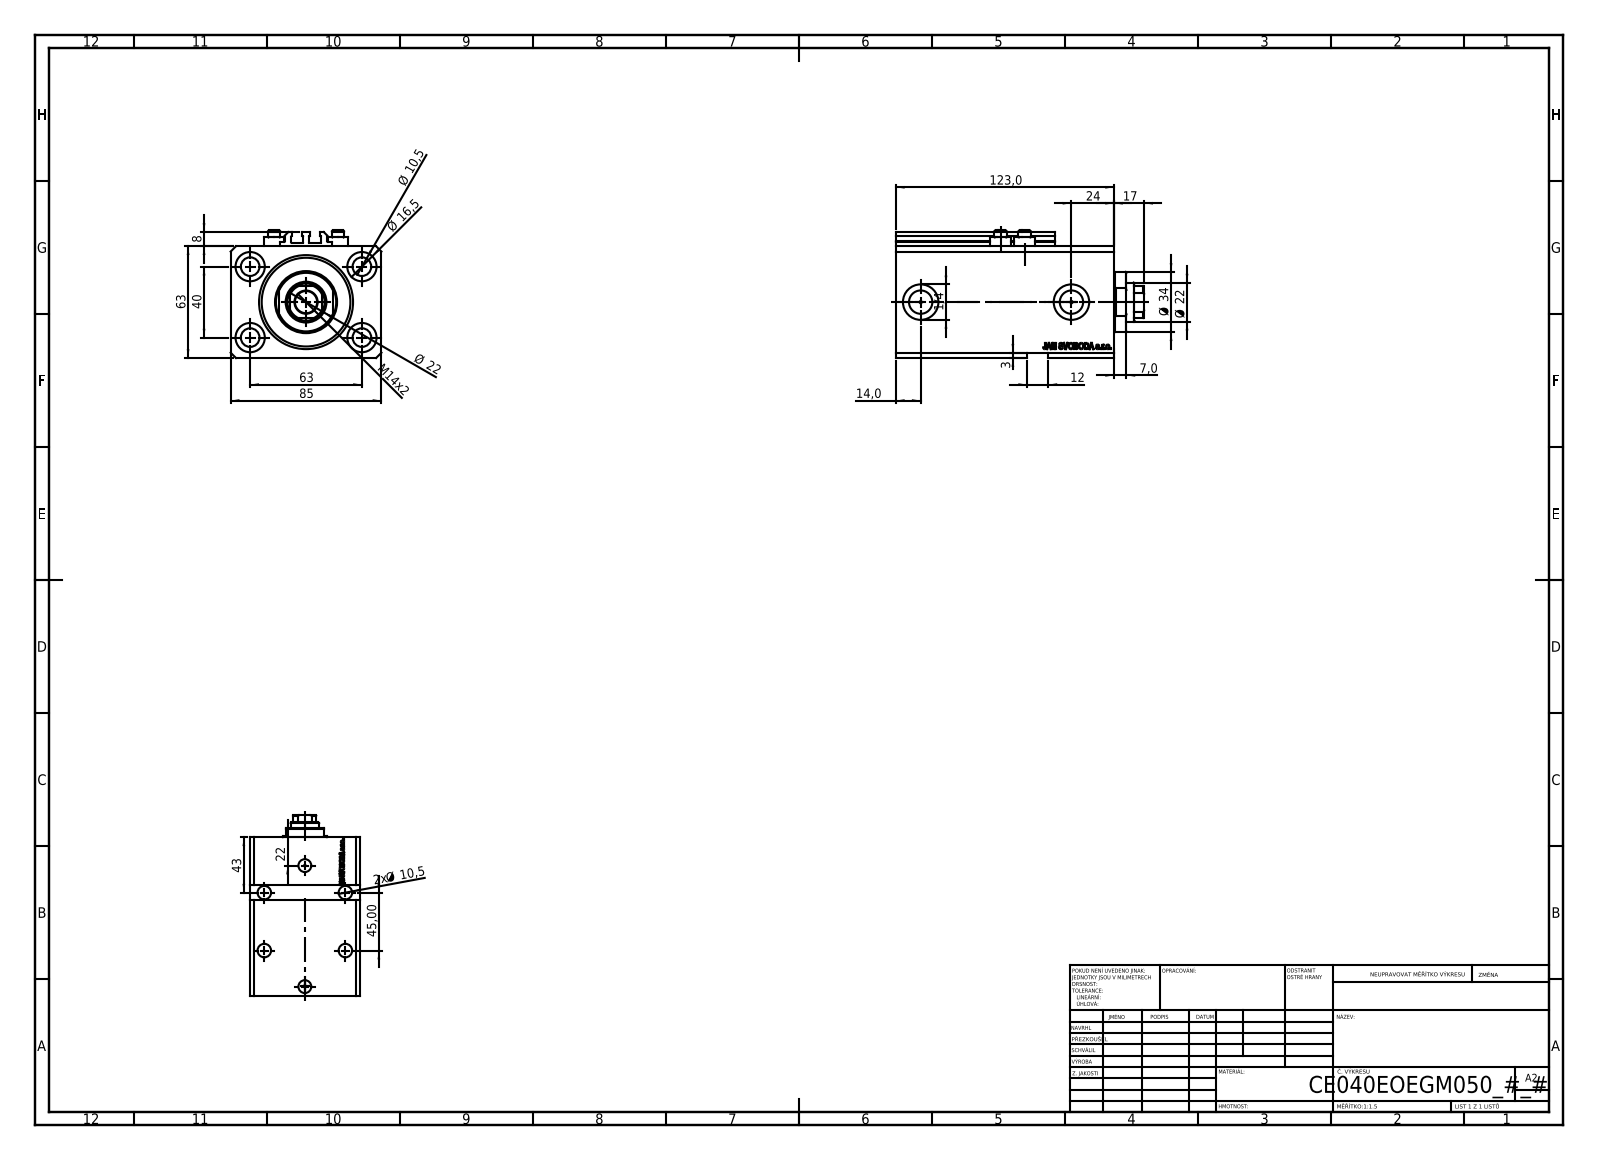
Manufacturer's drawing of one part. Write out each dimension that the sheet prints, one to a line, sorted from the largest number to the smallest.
123,0
85
63
63
45,00
43
40
Ø 34
24
Ø 22
Ø 22
22
17
Ø 16,5
M14x2
14,0
12
Ø 10,5
2x Ø 10,5
8
7,0
3
1/4
